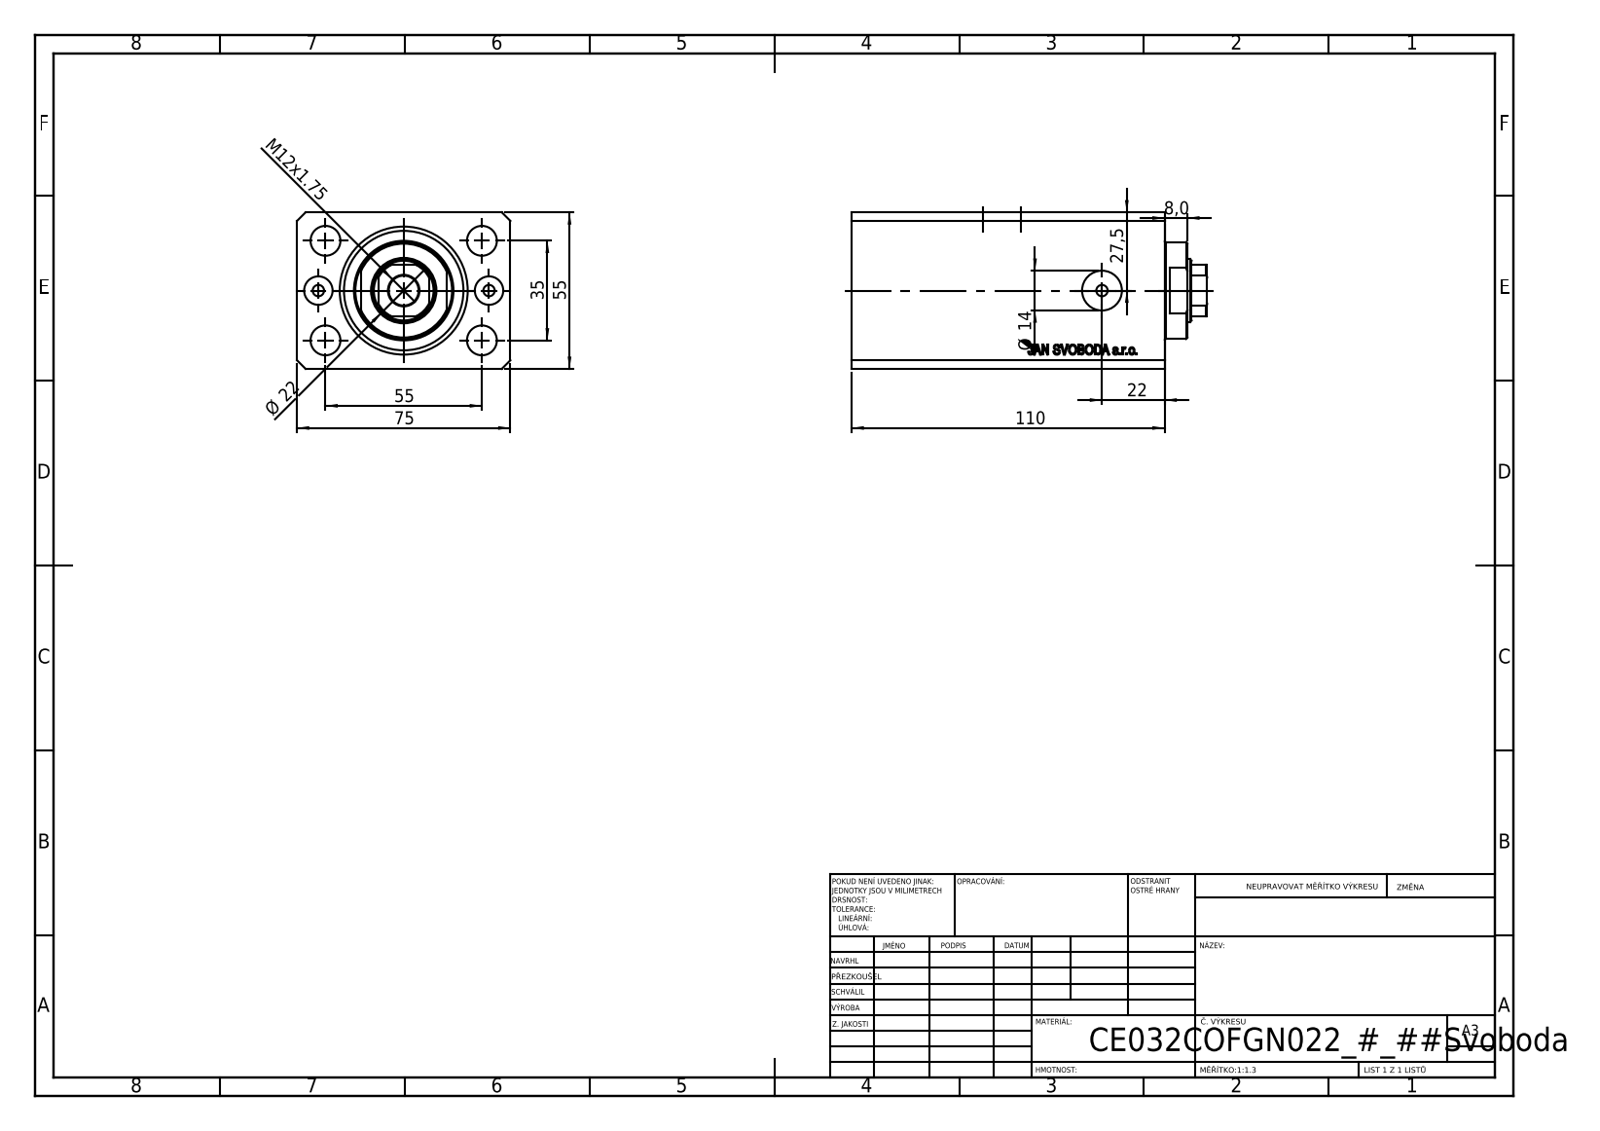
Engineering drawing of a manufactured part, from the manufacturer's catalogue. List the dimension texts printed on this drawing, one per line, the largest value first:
110
75
55
55
35
27,5
Ø 22
22
Ø 14
M12x1.75
8,0
